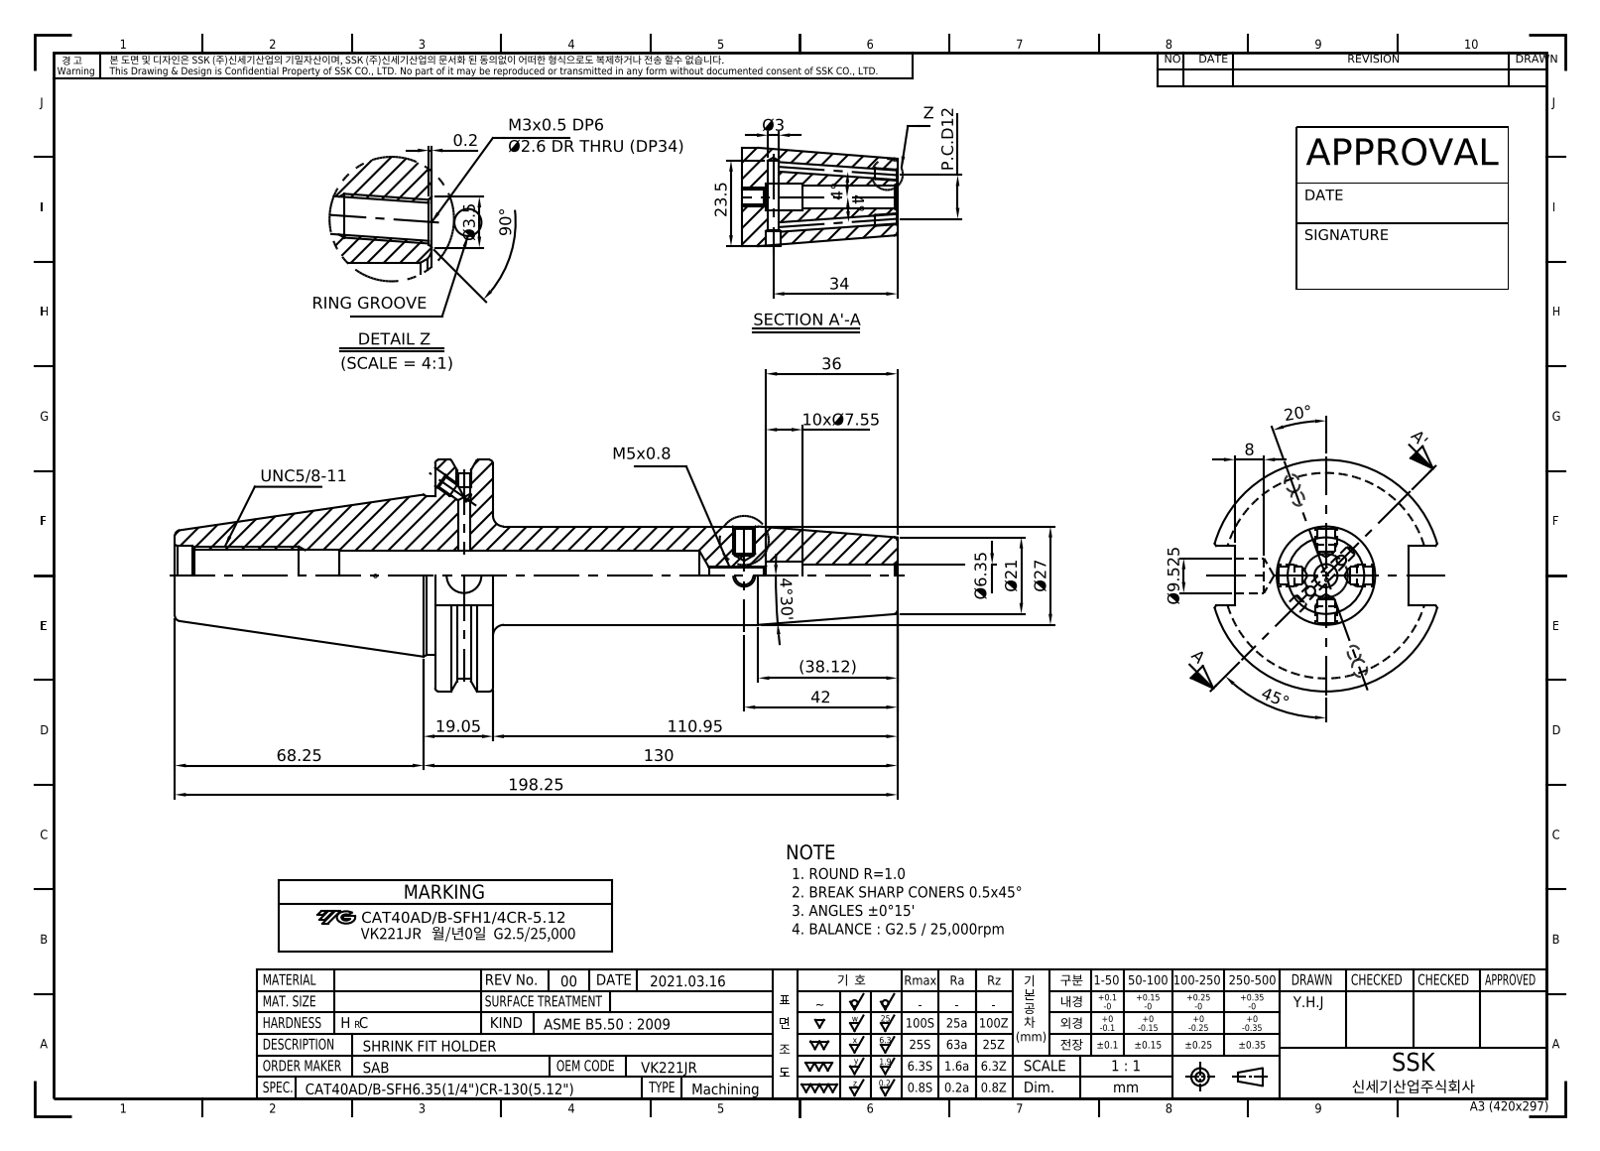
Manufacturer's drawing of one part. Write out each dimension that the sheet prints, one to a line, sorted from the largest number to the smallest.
198.25
130
110.95
90°
68.25
45°
42
(38.12)
36
34
Ø27
23.5
Ø21
20°
19.05
P.C.D12
Ø9.525
8
10xØ7.55
Ø6.35
4°30'
4°
4°
Ø3.5
Ø3
0.2
